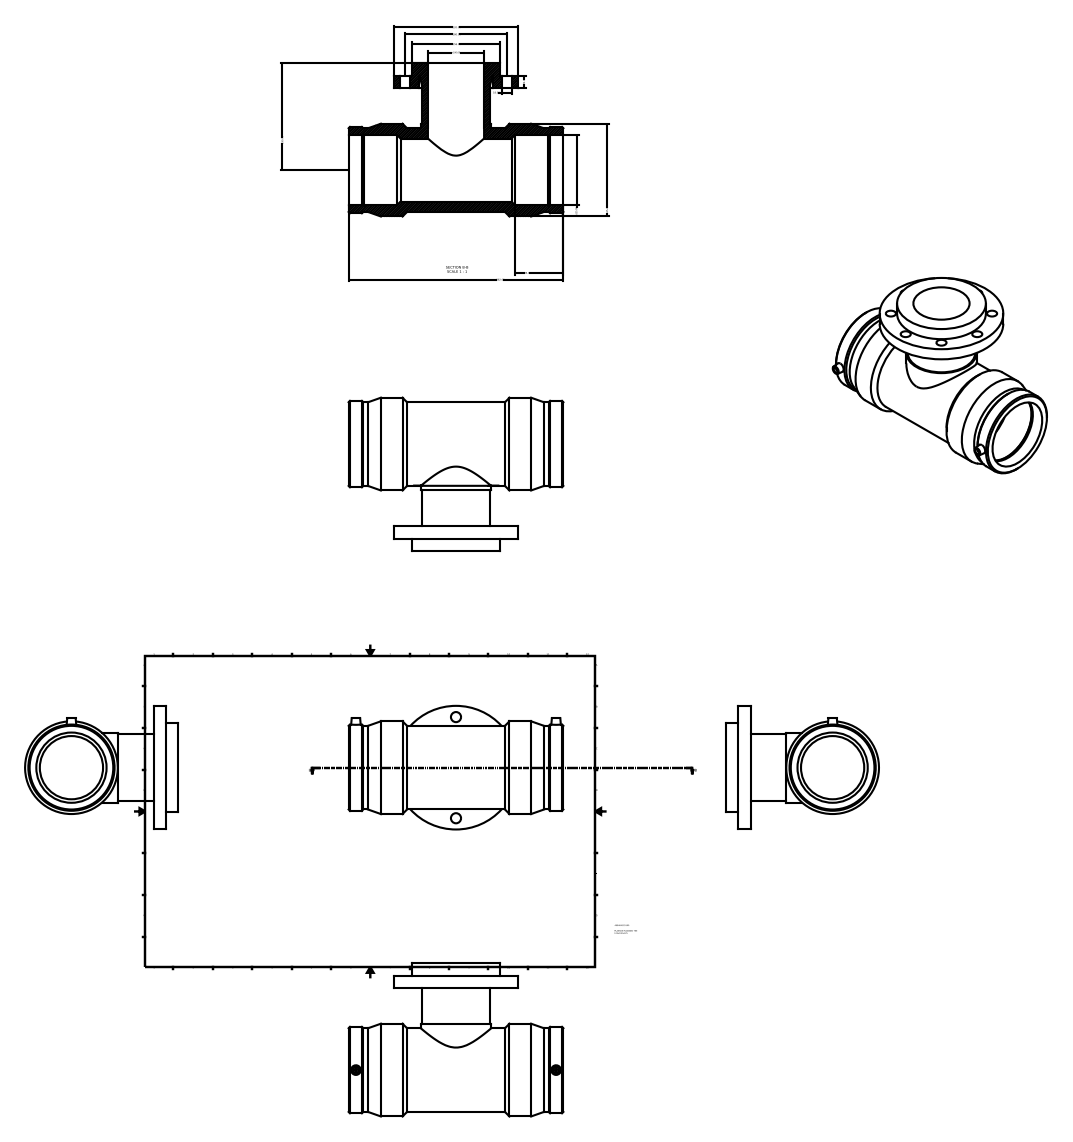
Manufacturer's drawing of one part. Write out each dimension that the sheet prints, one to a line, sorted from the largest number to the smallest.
382.00
220.00
190.00
180.00
165.00
158.00
n125.00
n100.00
86.00
22.00
18.00
